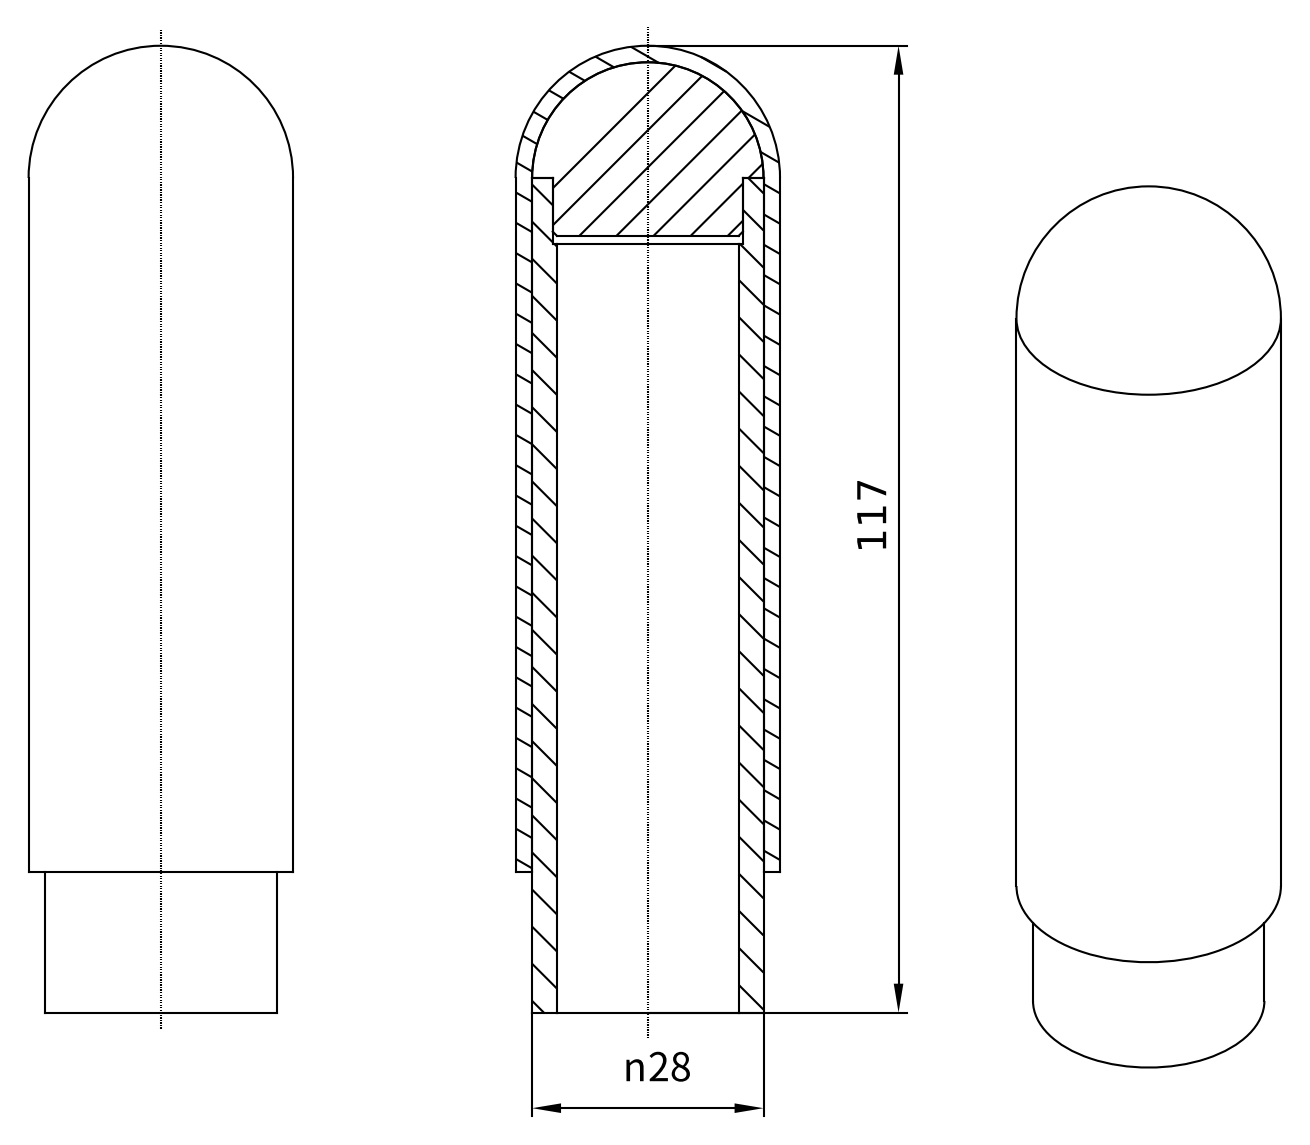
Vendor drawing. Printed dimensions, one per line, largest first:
117
n28
